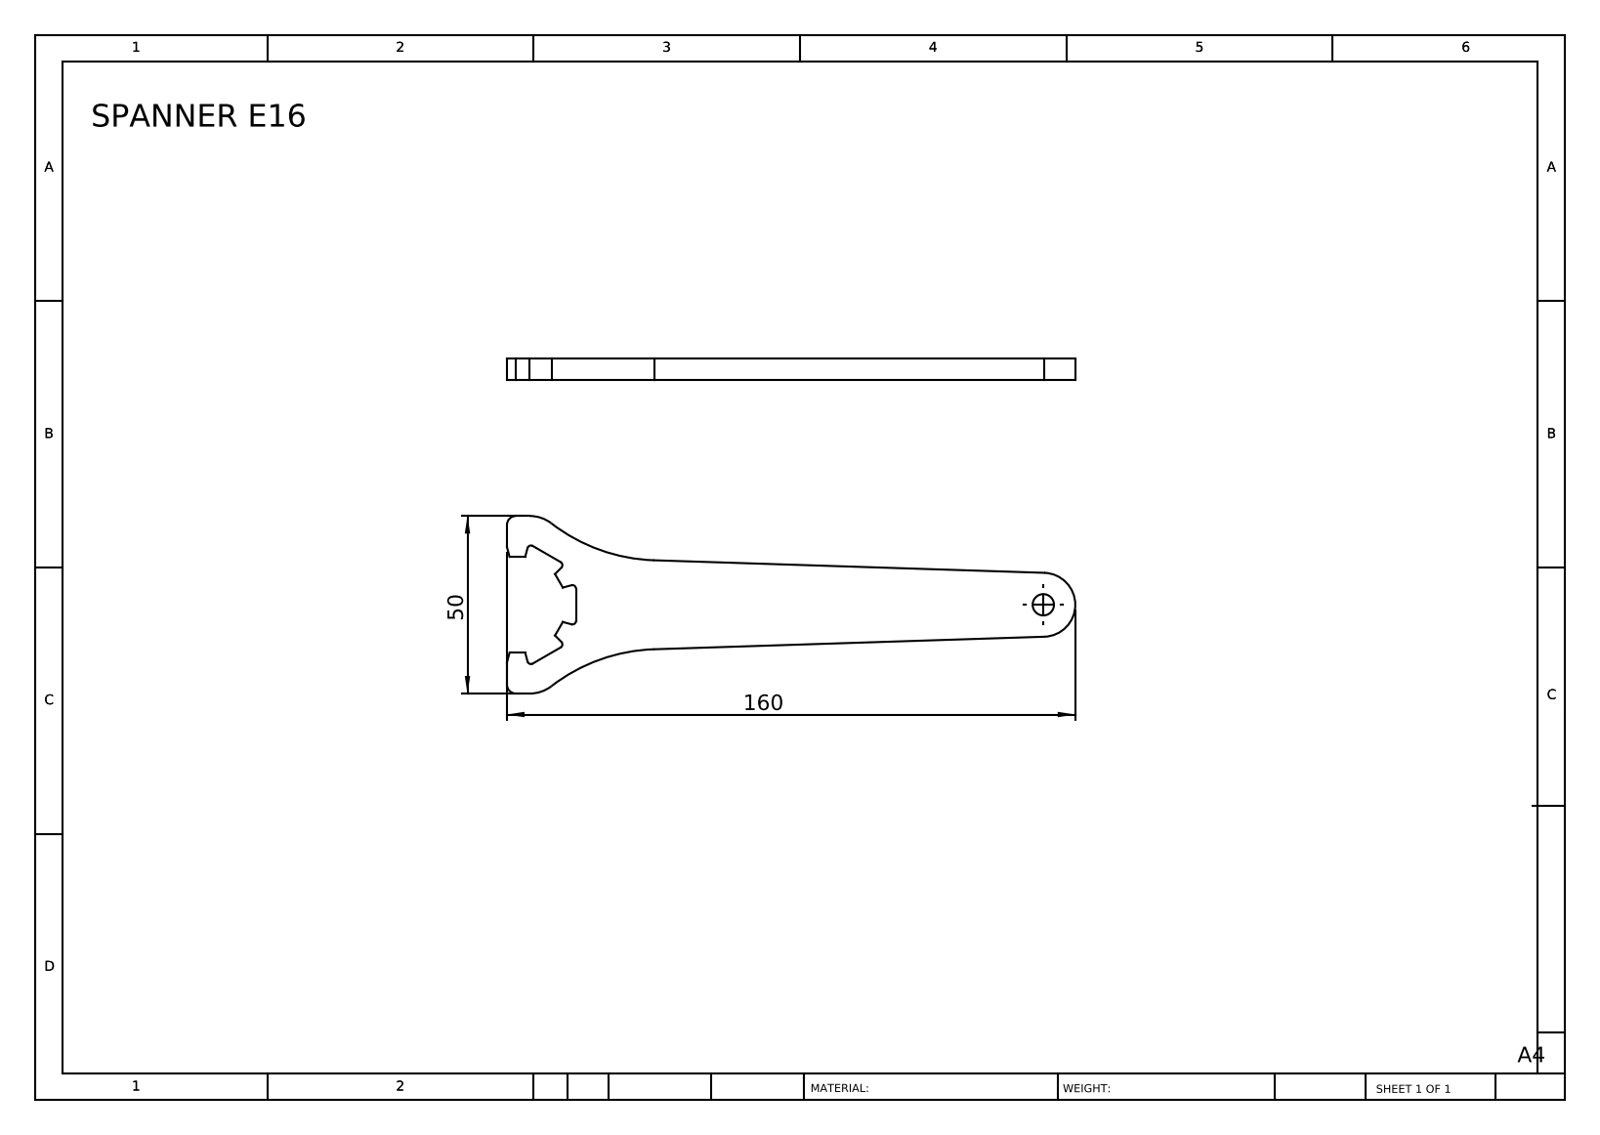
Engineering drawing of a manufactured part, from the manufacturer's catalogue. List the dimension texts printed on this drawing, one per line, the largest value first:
160
50
